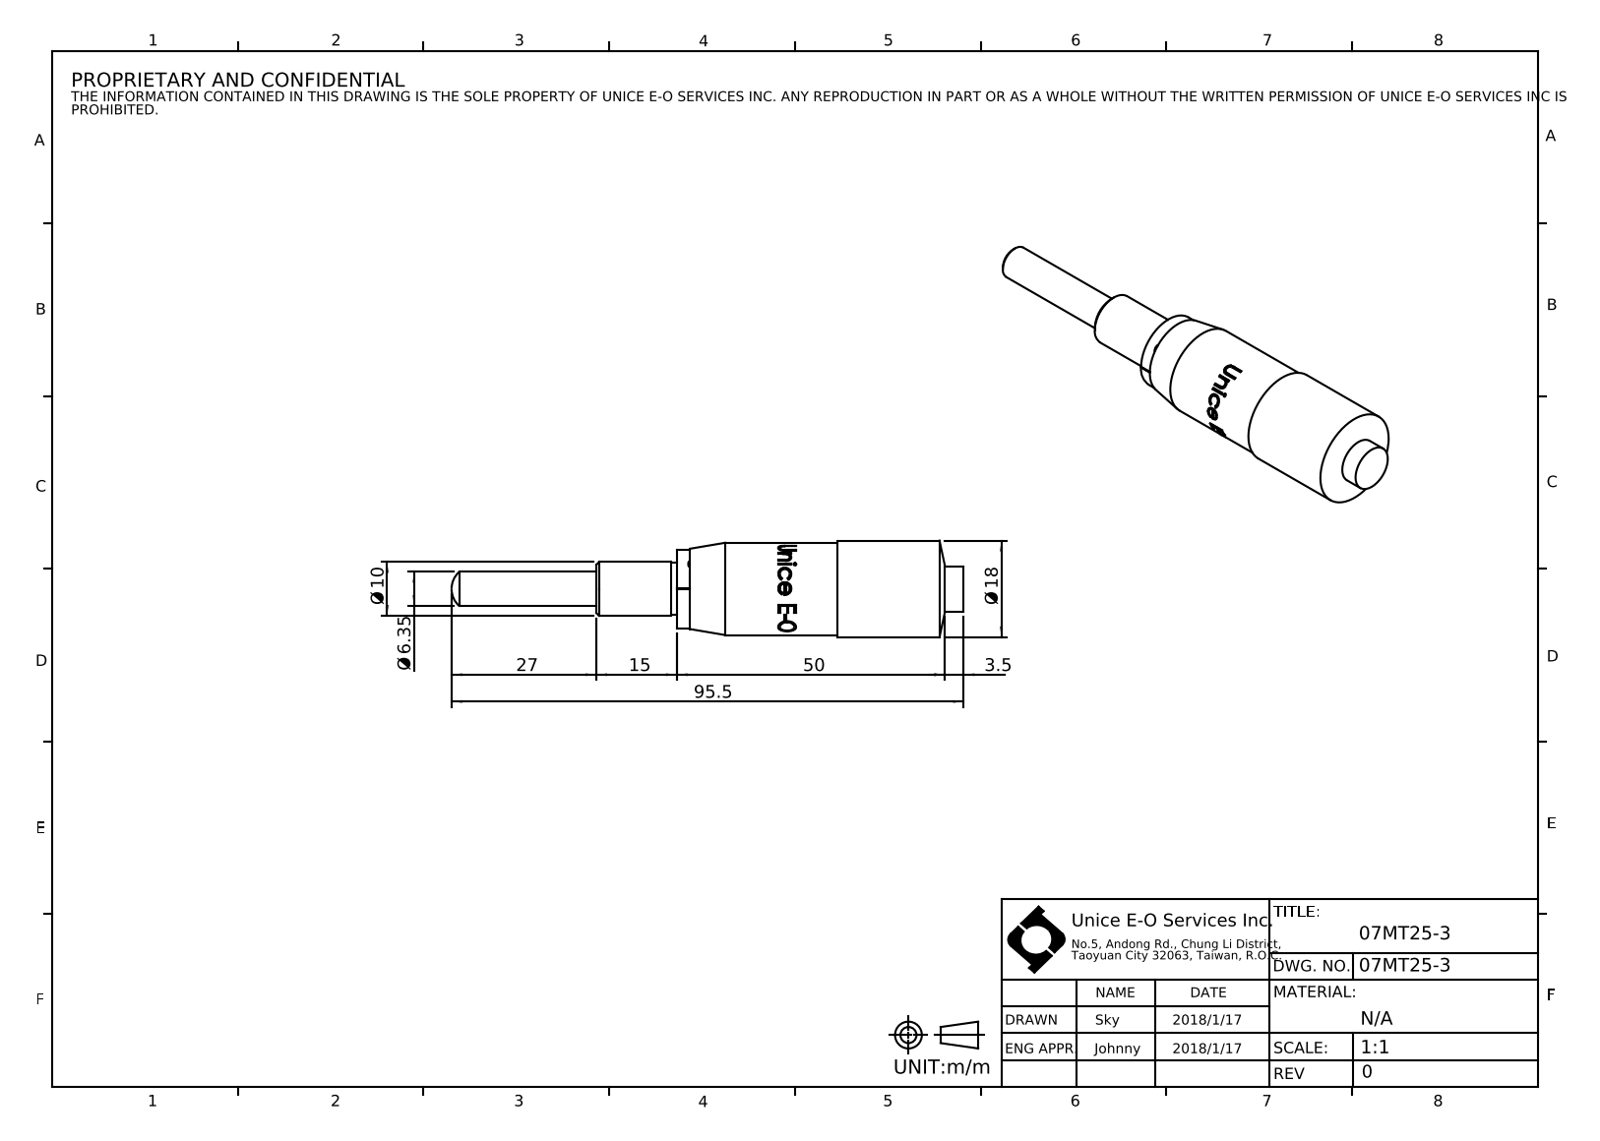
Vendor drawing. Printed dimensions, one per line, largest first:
95.5
50
27
Ø 18
15
Ø 10
Ø 6.35
3.5
